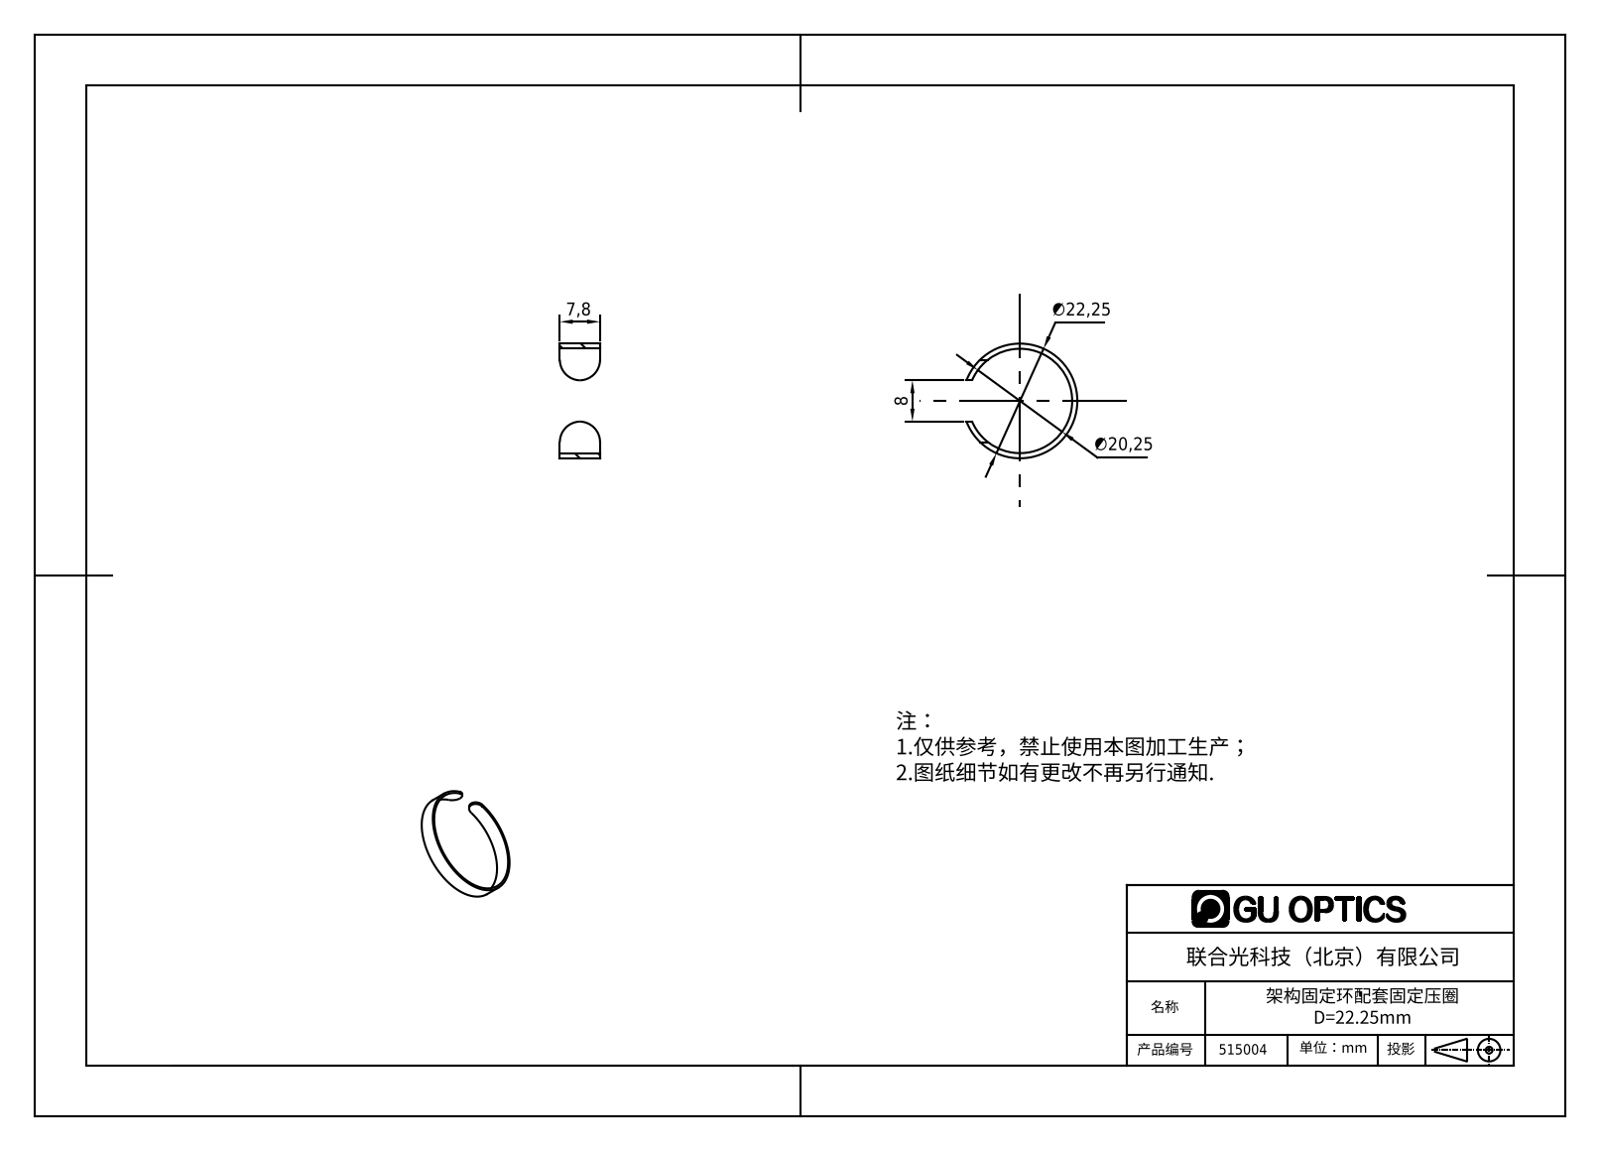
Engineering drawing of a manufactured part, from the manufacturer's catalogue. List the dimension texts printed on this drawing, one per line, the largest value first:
∅22,25
∅20,25
8
7,8
